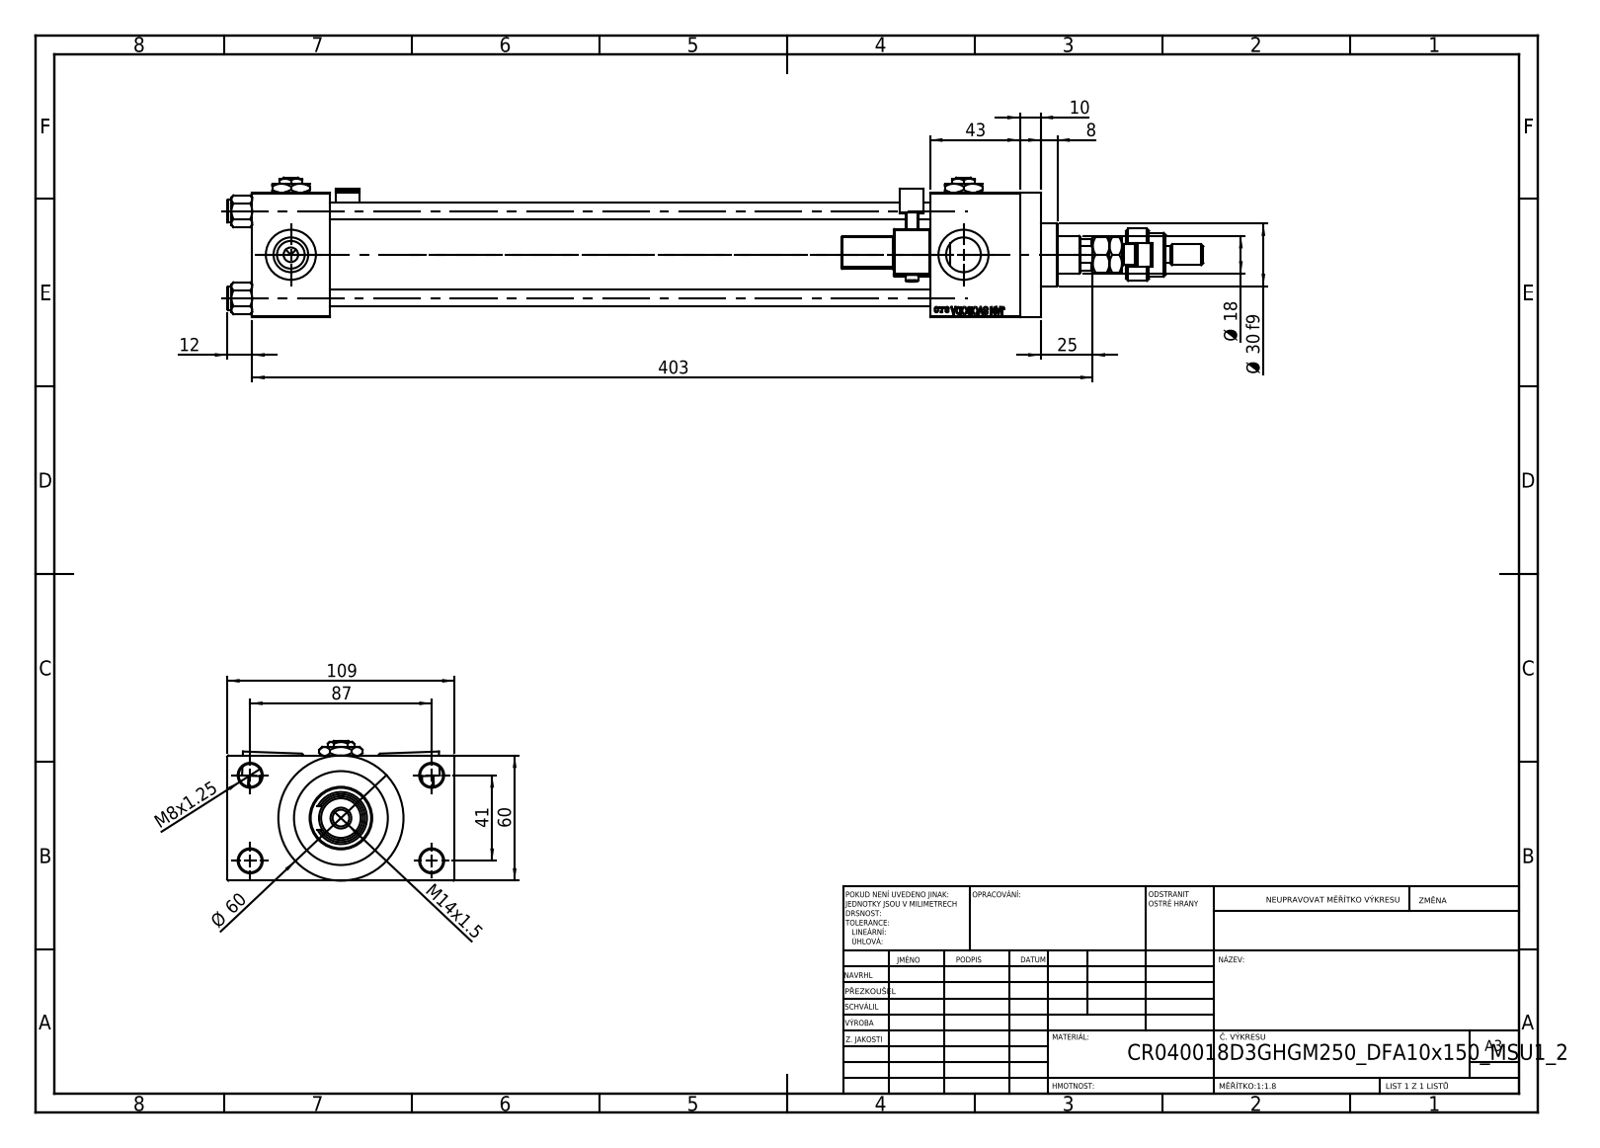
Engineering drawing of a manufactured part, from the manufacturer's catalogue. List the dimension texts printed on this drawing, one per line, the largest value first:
403
109
87
Ø 60
60
43
41
Ø 30 f9
25
Ø 18
M14x1.5
12
10
8
M8x1.25
